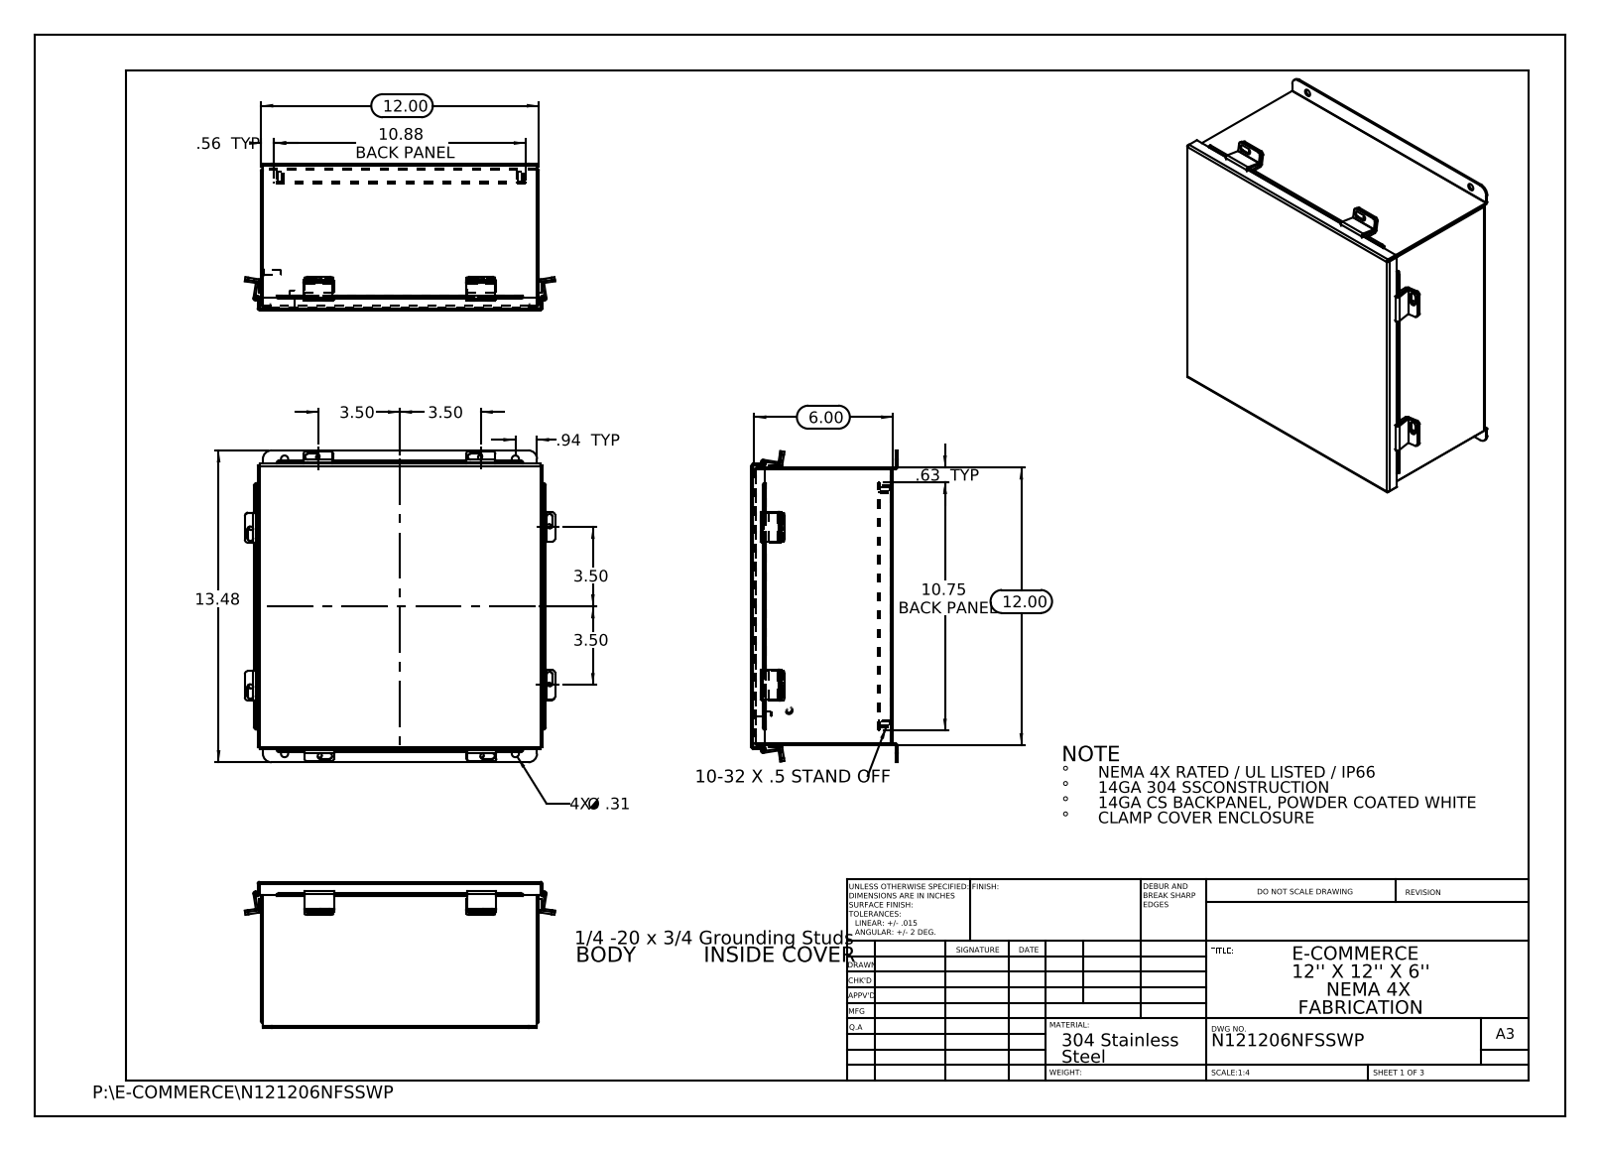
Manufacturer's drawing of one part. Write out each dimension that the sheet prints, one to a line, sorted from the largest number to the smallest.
13.48
12.00
12.00
10.88 BACK PANEL
10.75 BACK PANEL
6.00
3.50
3.50
3.50
3.50
.94 TYP
.63 TYP
.56 TYP
4X Ø .31
